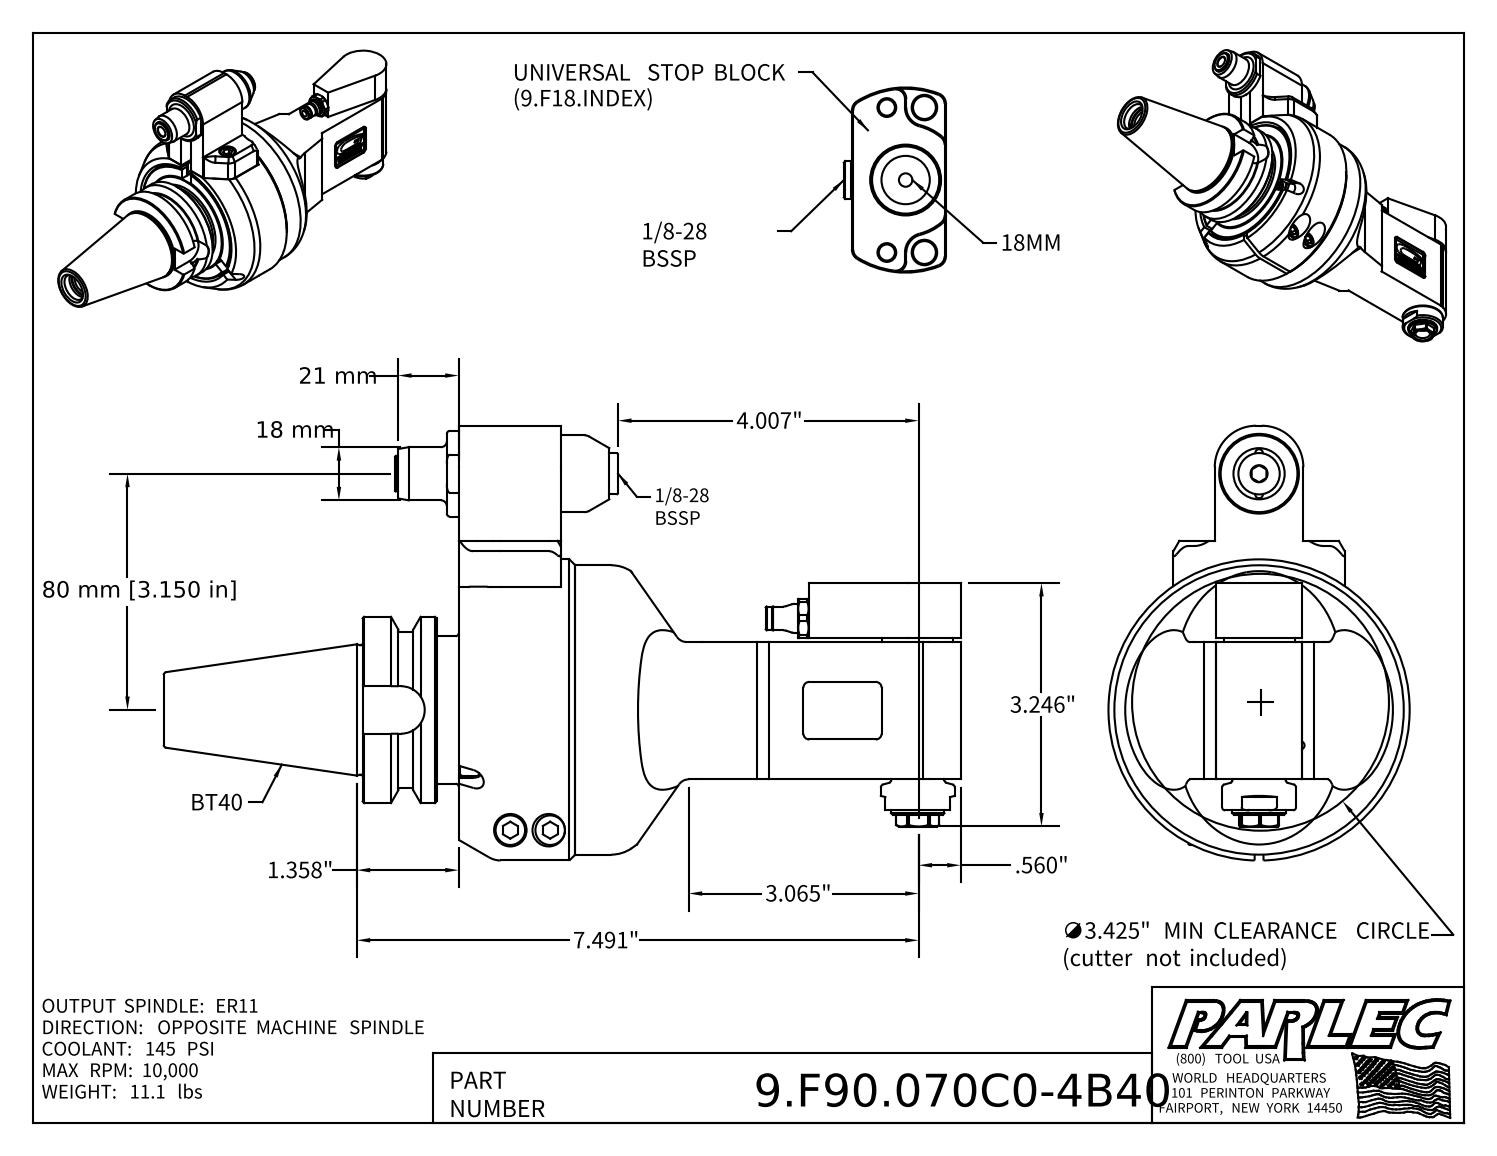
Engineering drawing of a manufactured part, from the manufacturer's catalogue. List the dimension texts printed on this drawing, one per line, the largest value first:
80 mm [3.150 in]
21 mm
18 mm
7.491"
4.007"
∅3.425" MIN CLEARANCE CIRCLE (cutter not included)
3.246"
3.065"
1.358"
.560"
